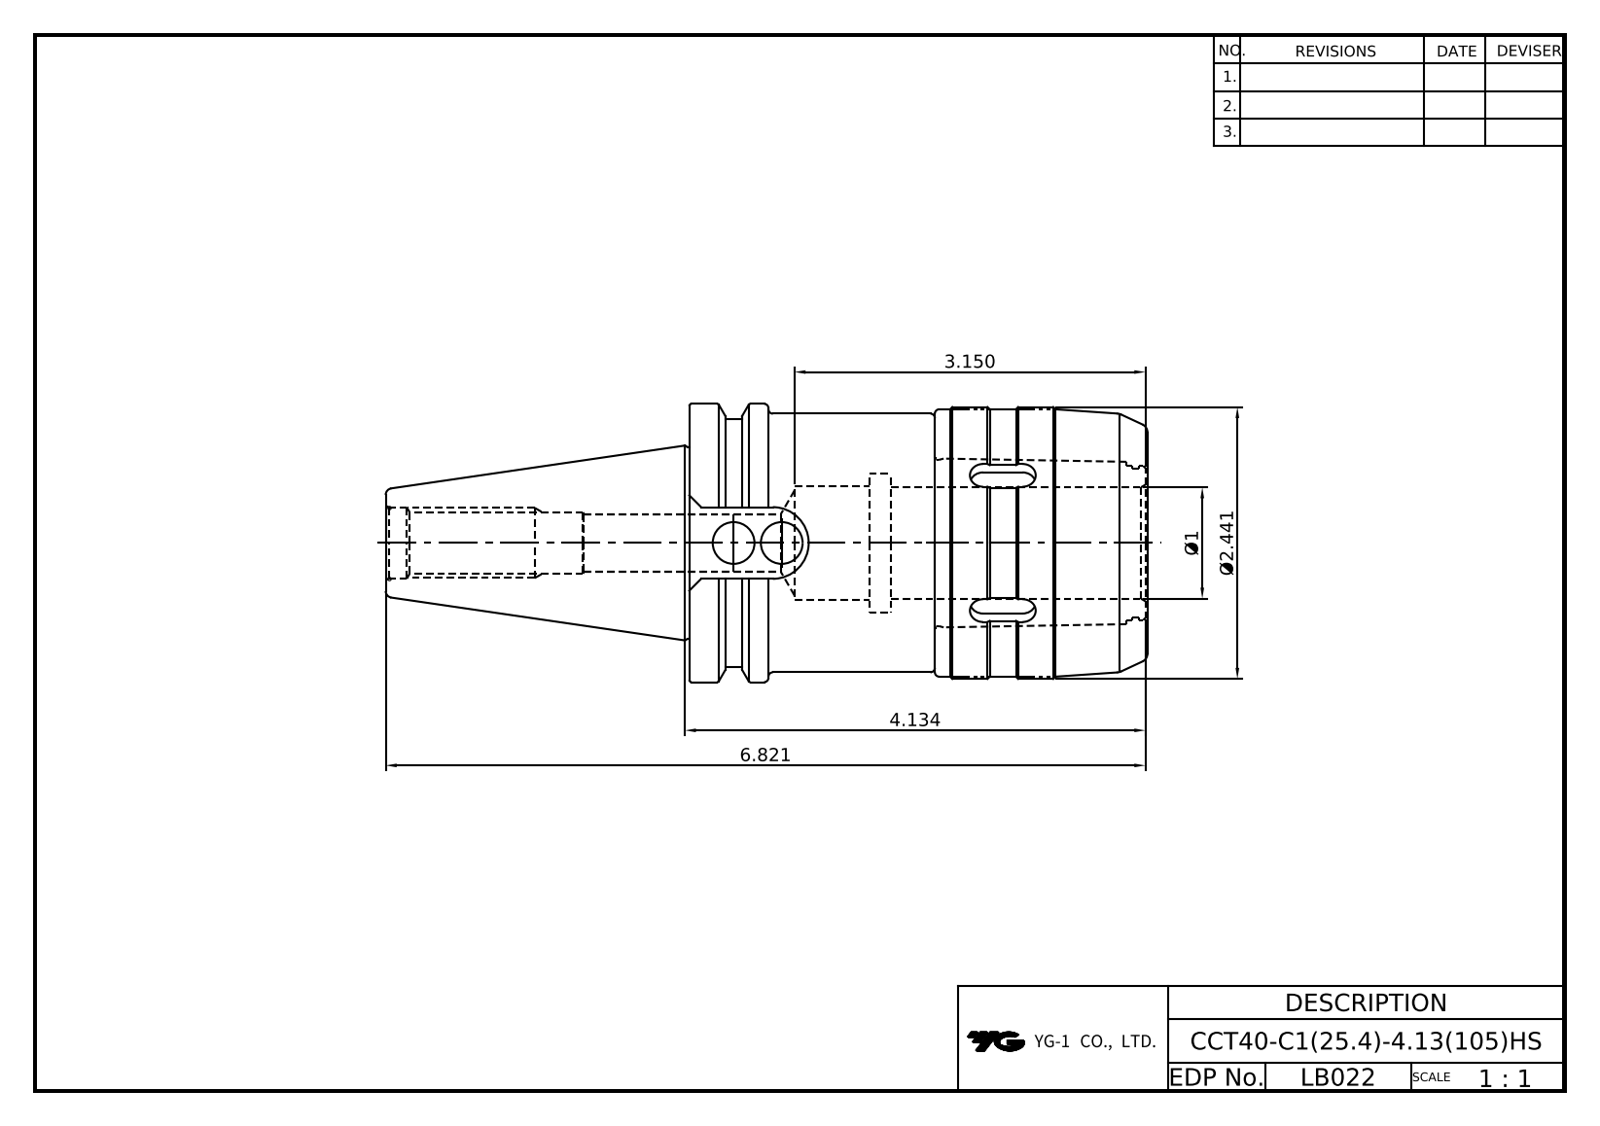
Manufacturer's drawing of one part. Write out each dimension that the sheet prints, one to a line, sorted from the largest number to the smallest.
6.821
4.134
3.150
Ø2.441
Ø1
